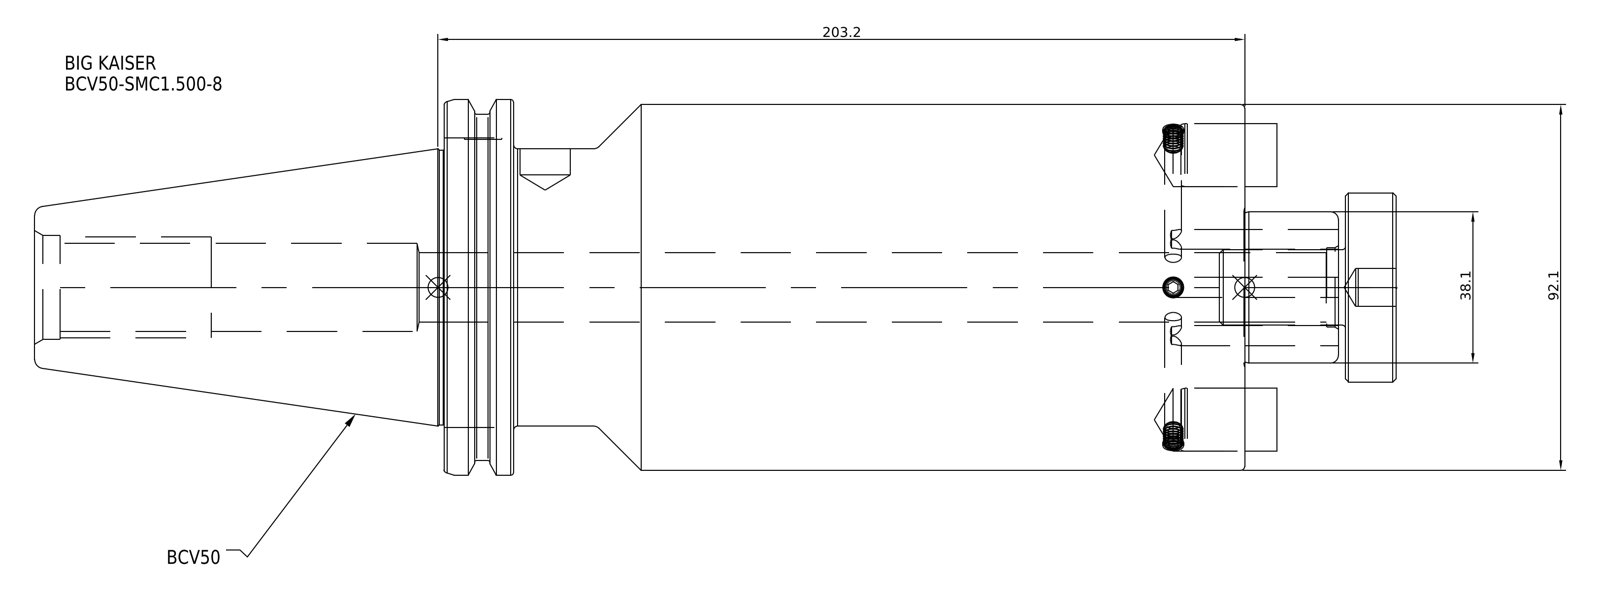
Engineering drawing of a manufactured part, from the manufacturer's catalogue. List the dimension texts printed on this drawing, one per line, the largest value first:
203.2
92.1
38.1
